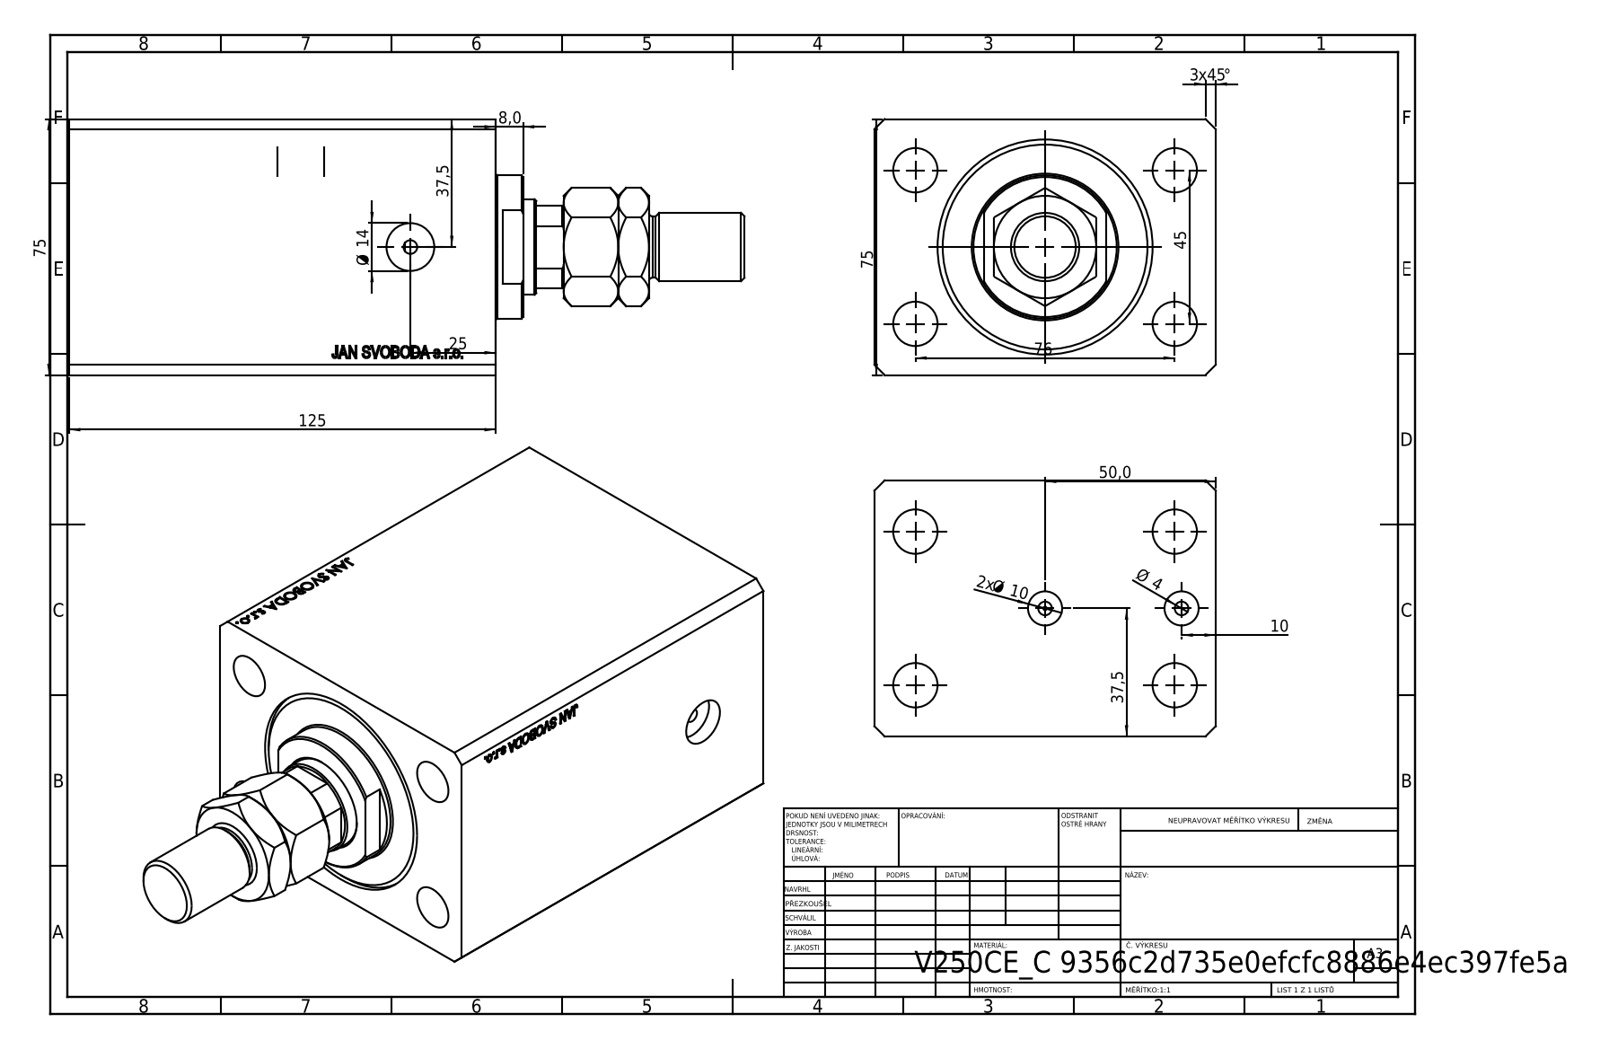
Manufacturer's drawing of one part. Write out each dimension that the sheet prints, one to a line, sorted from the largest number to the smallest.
125
76
75
75
50,0
3 x45 °
45
37,5
37,5
25
Ø 14
2x Ø 10
10
8,0
Ø 4
